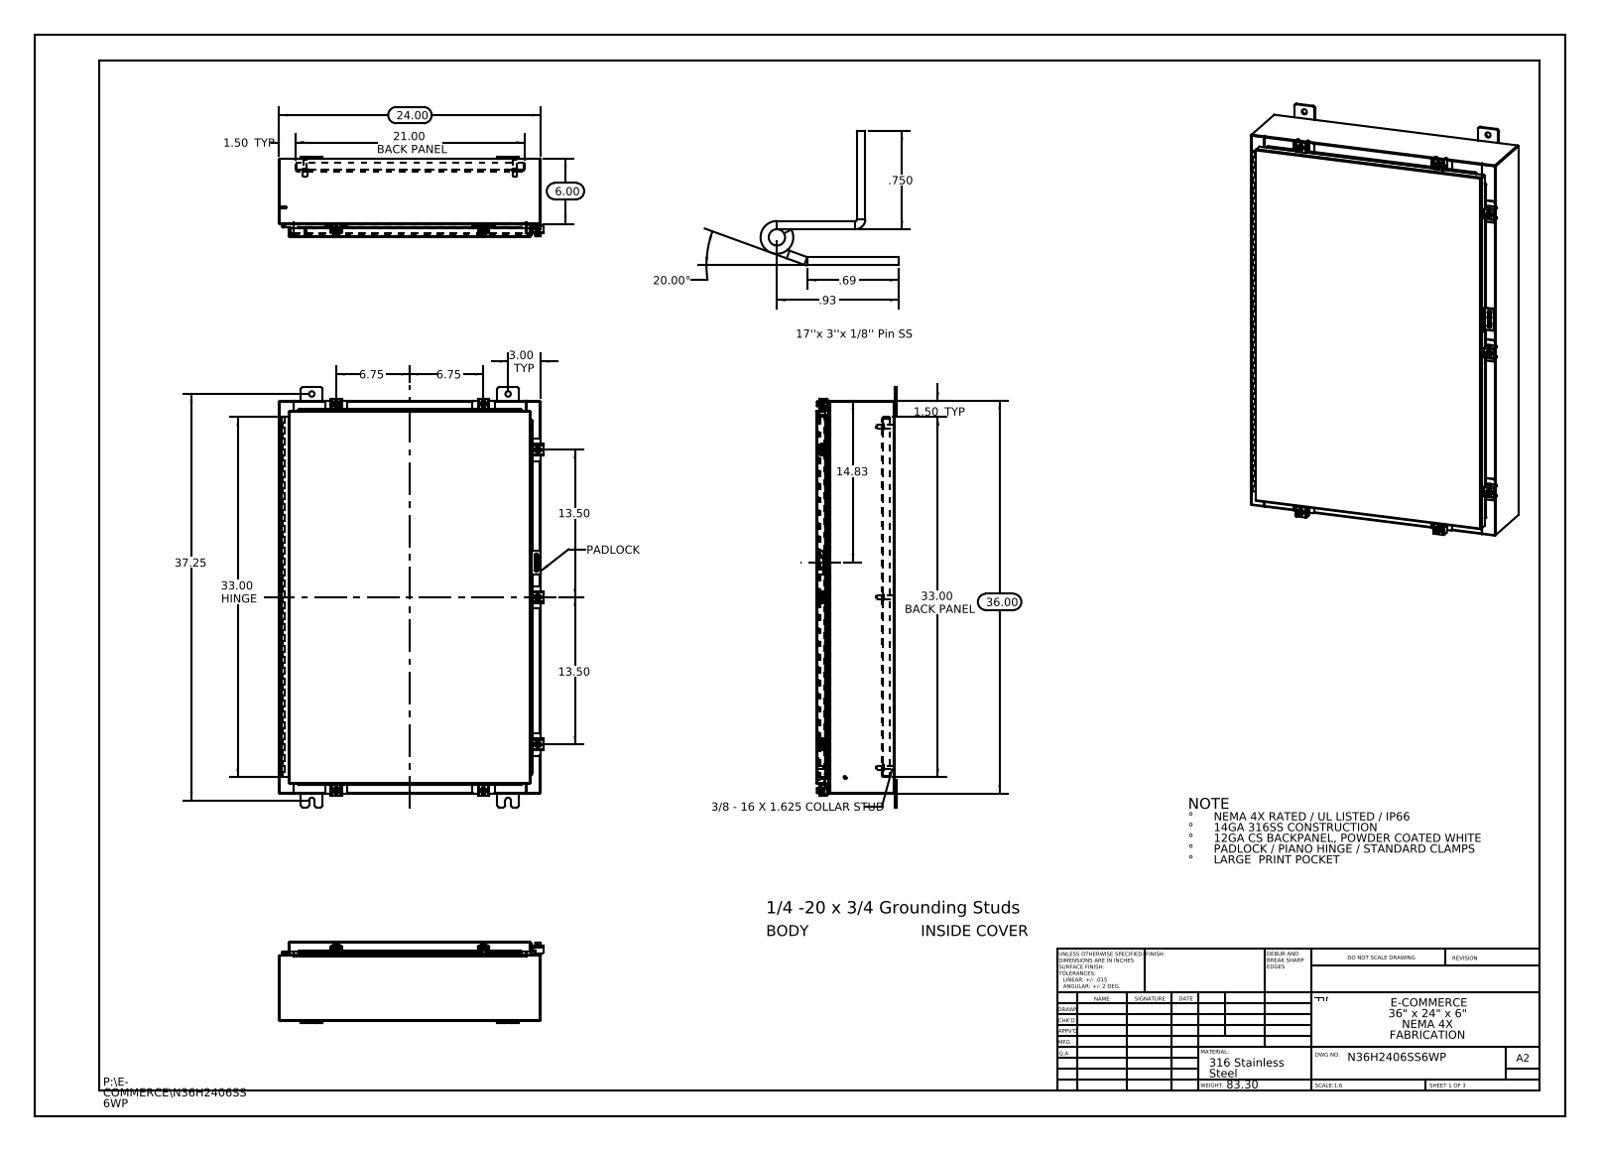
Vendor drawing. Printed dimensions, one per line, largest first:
37.25
36.00
33.00 HINGE
33.00 BACK PANEL
24.00
21.00 BACK PANEL
20.00°
14.83
13.50
13.50
6.75
6.75
6.00
3.00 TYP
1.50 TYP
1.50 TYP
.93
.750
.69
